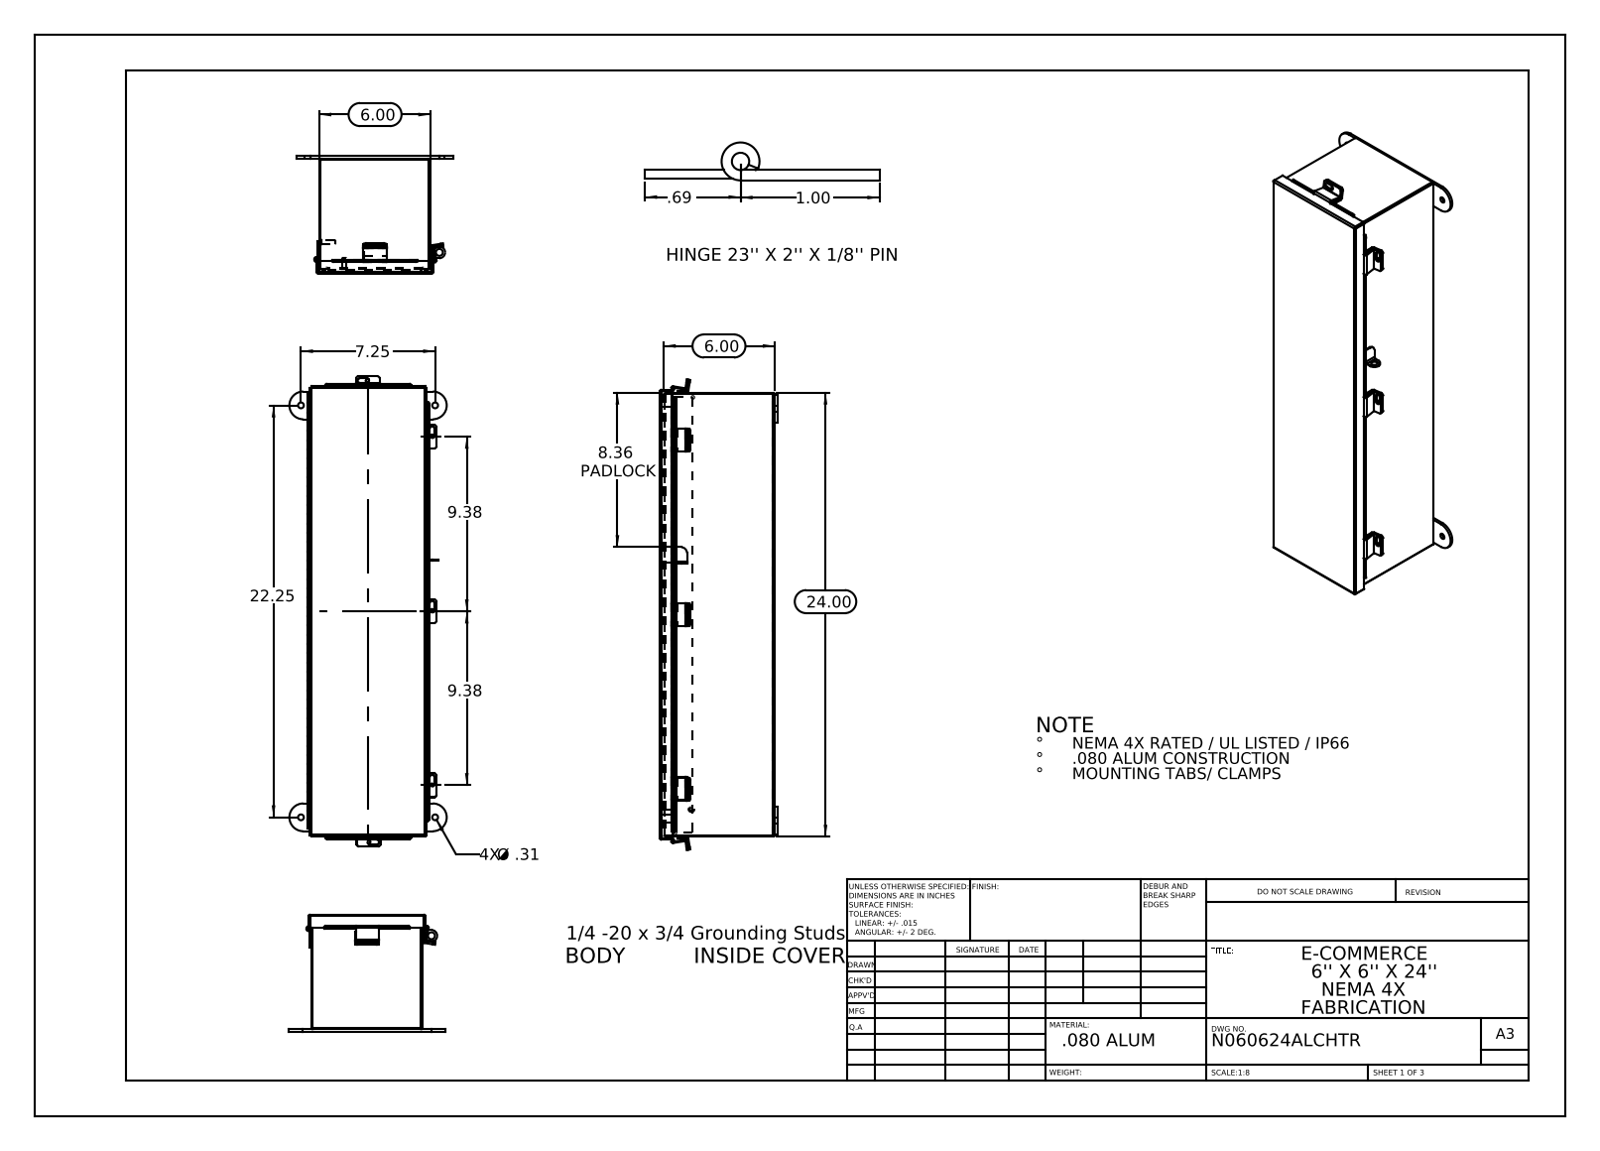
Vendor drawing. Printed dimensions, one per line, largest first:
24.00
22.25
9.38
9.38
8.36 PADLOCK
7.25
6.00
6.00
1.00
.69
4X Ø .31
